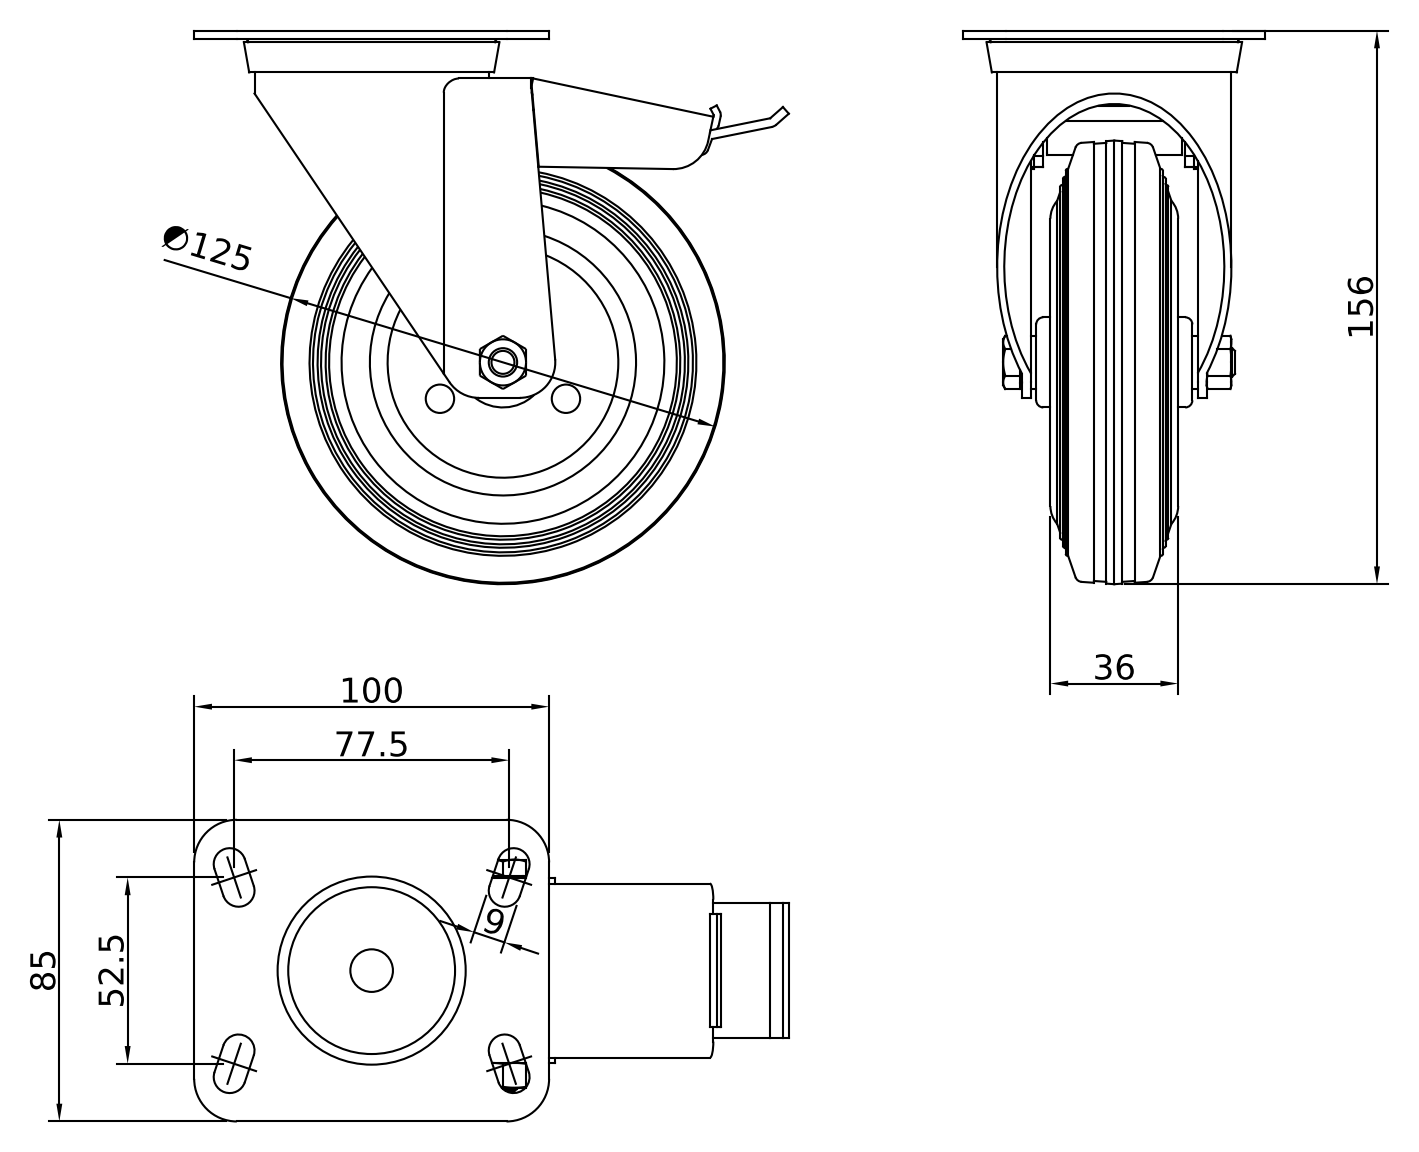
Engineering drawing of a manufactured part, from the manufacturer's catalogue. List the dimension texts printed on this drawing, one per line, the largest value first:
156
∅125
100
85
77.5
52.5
36
9
